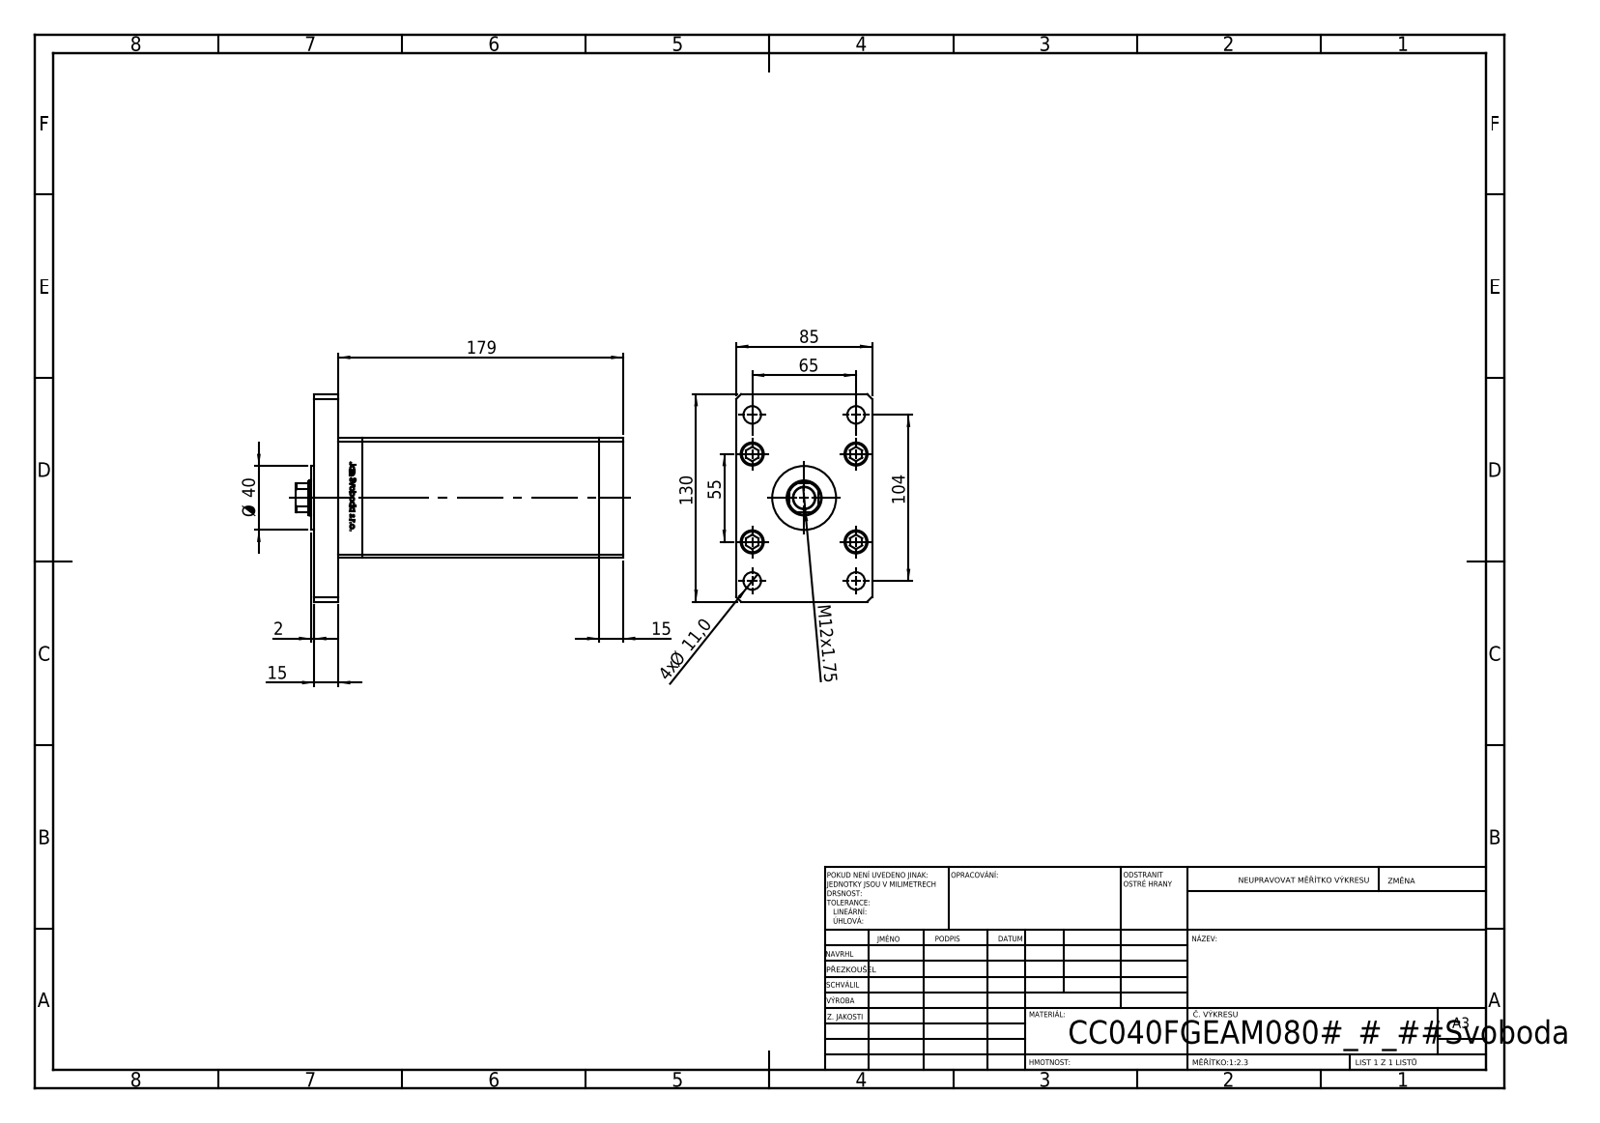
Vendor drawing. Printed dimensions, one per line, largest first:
179
130
104
85
65
55
Ø 40
15
15
M12x1.75
4x Ø 11,0
2
